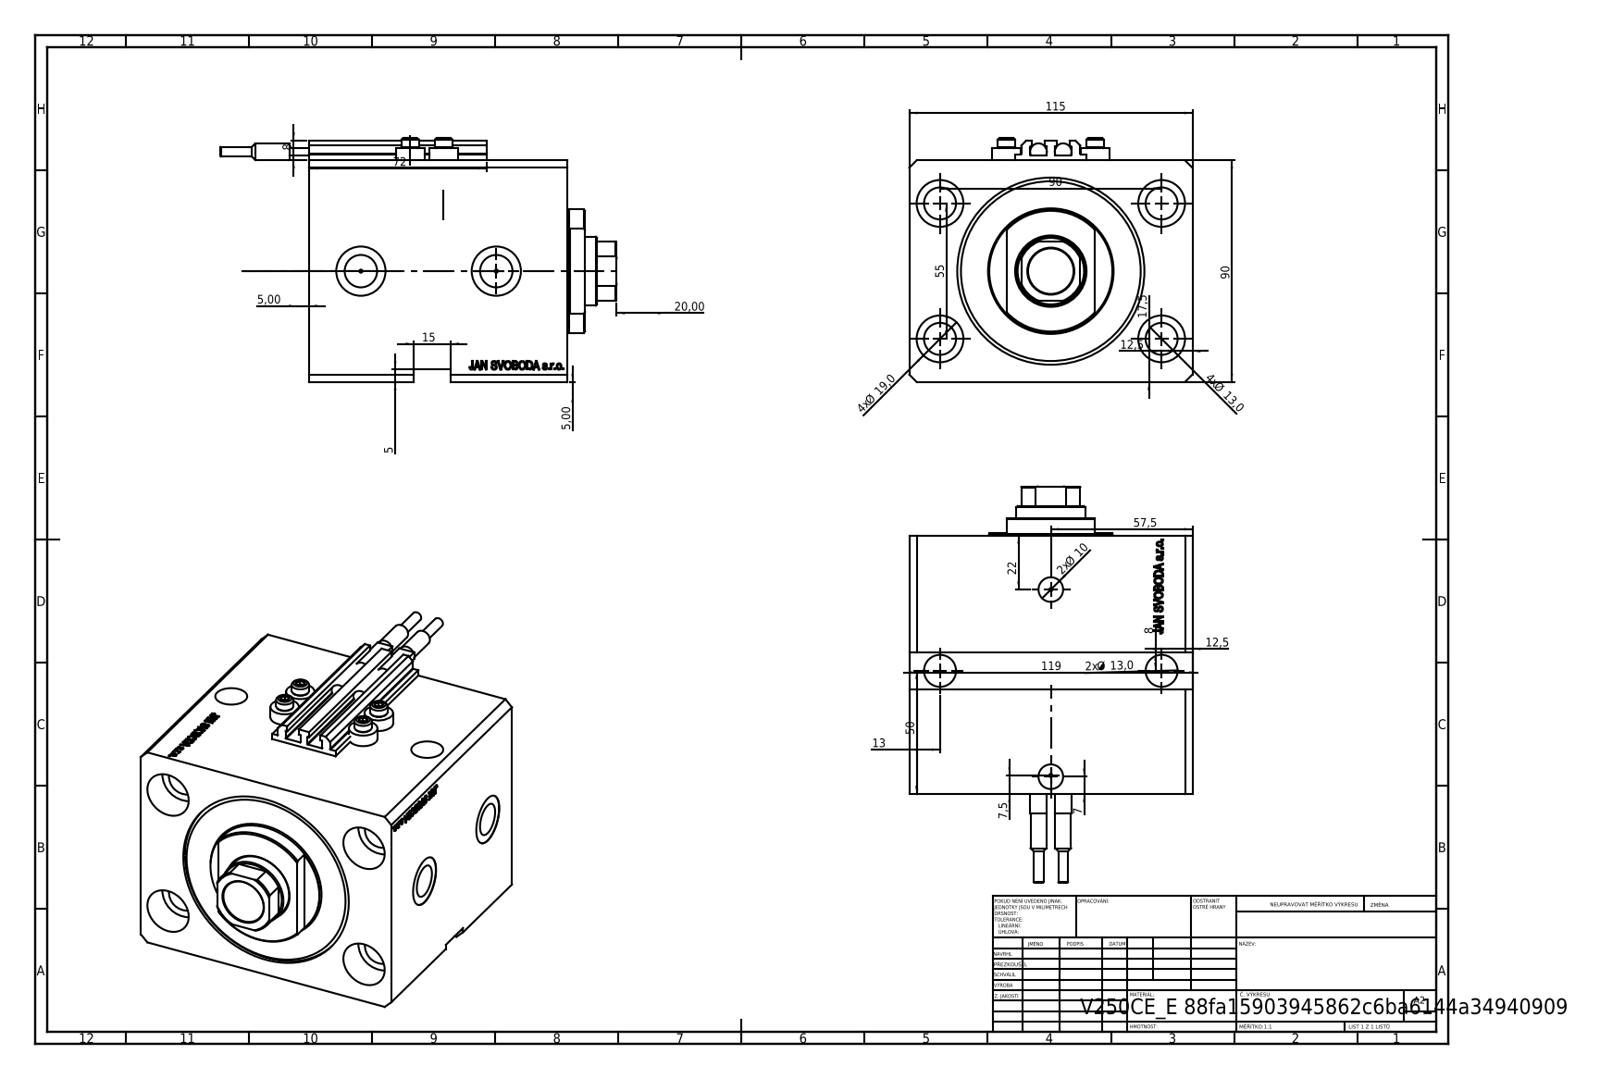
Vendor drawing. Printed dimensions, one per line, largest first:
119
115
90
90
72
57,5
55
50
22
20,00
4x Ø 19,0
17,5
15
4x Ø 13,0
2x Ø 13,0
13
12,5
12,5
2x Ø 10
8
8
7,5
7
5,00
5,00
5
